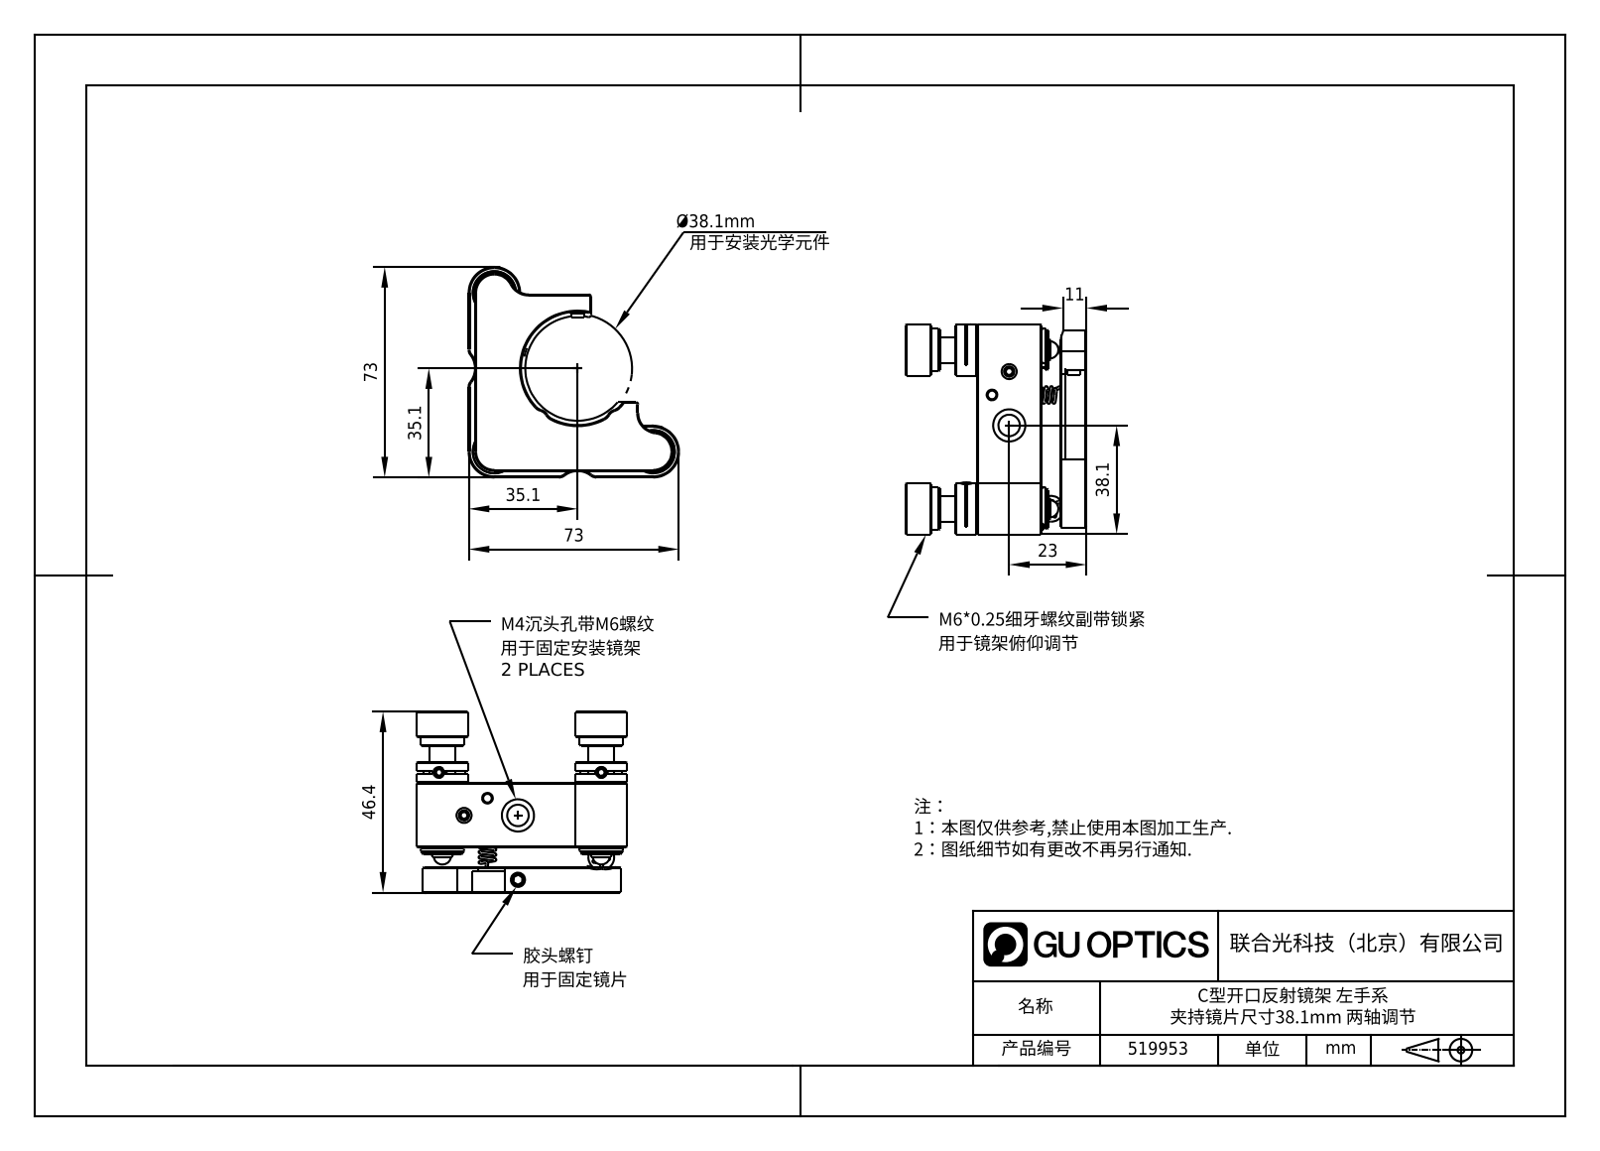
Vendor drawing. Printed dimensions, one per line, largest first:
73
73
46.4
38.1
35.1
35.1
23
11
